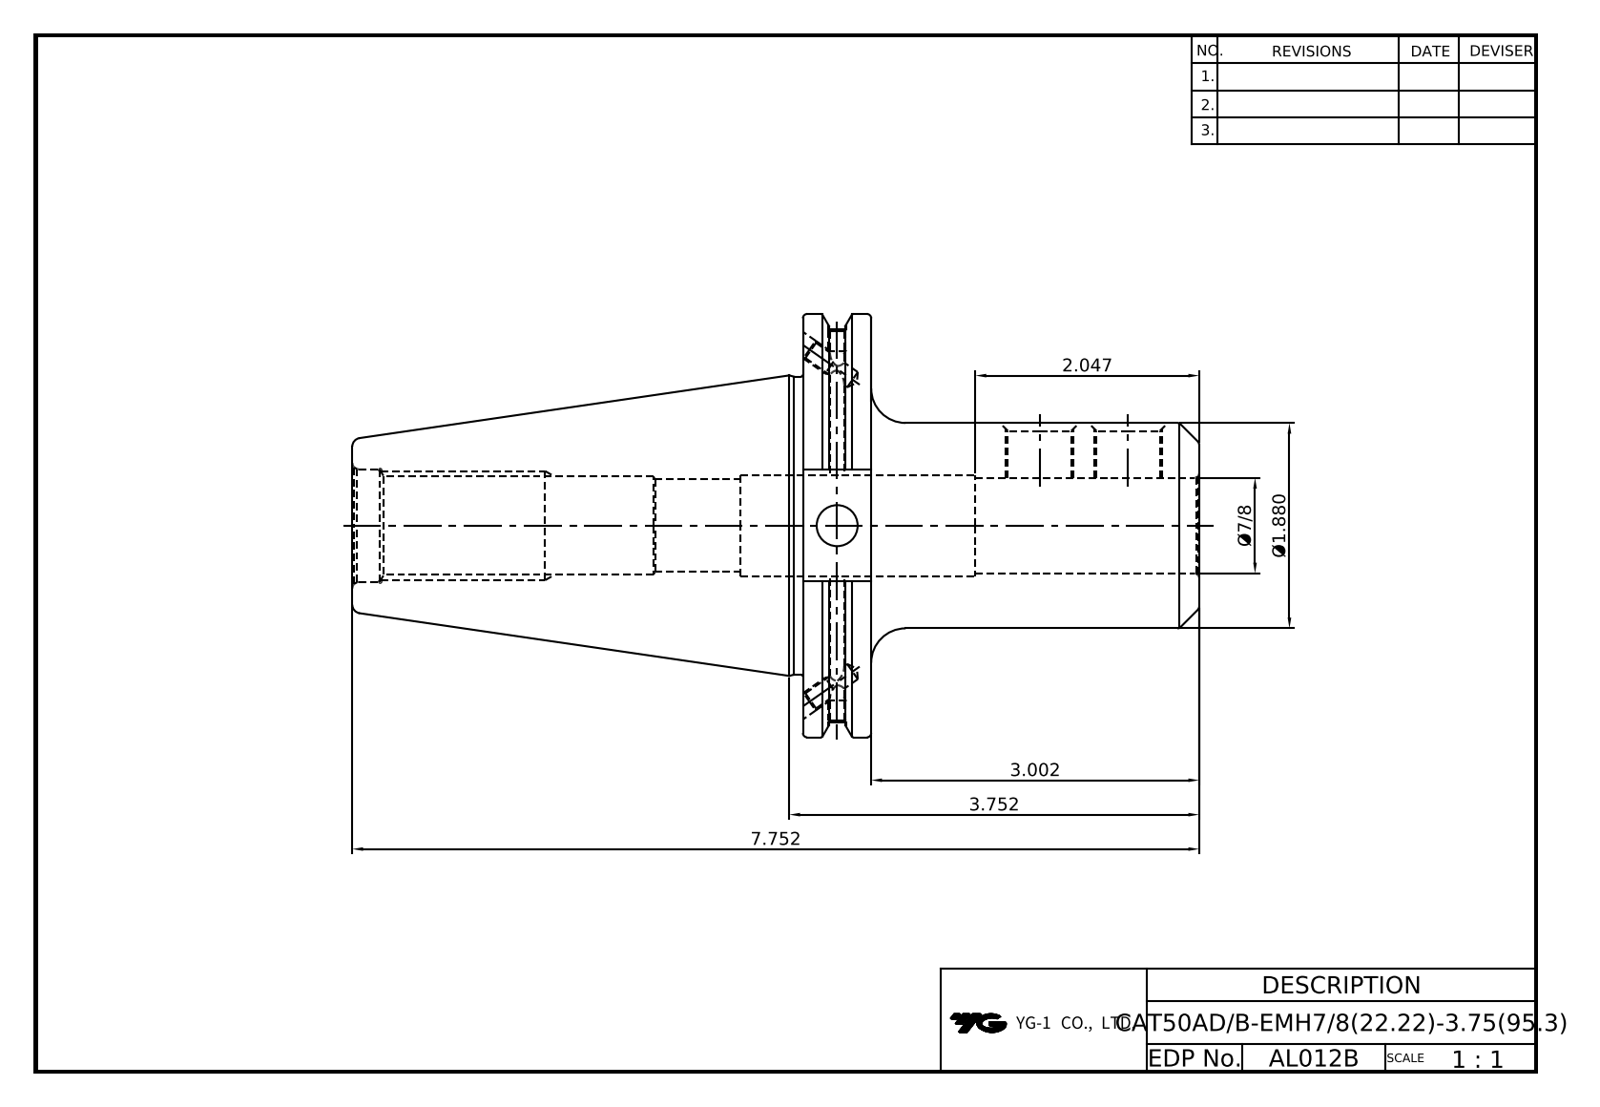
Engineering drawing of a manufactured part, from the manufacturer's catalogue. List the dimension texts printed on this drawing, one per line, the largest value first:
7.752
3.752
3.002
2.047
Ø1.880
Ø7/8
